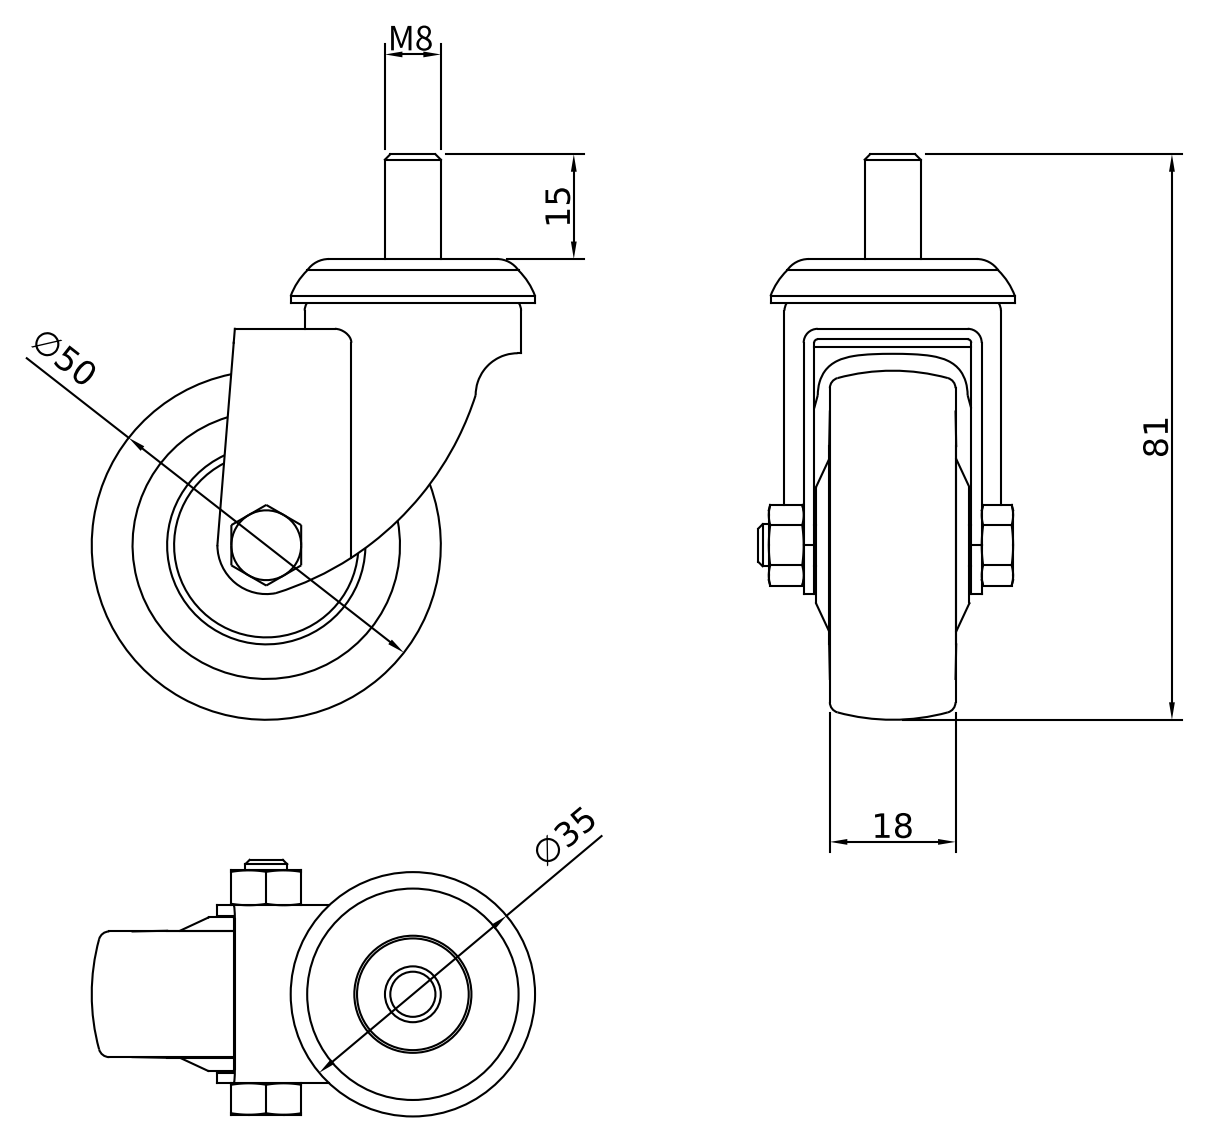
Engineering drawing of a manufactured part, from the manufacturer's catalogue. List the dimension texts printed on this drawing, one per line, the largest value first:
81
∅50
∅35
18
15
M8
